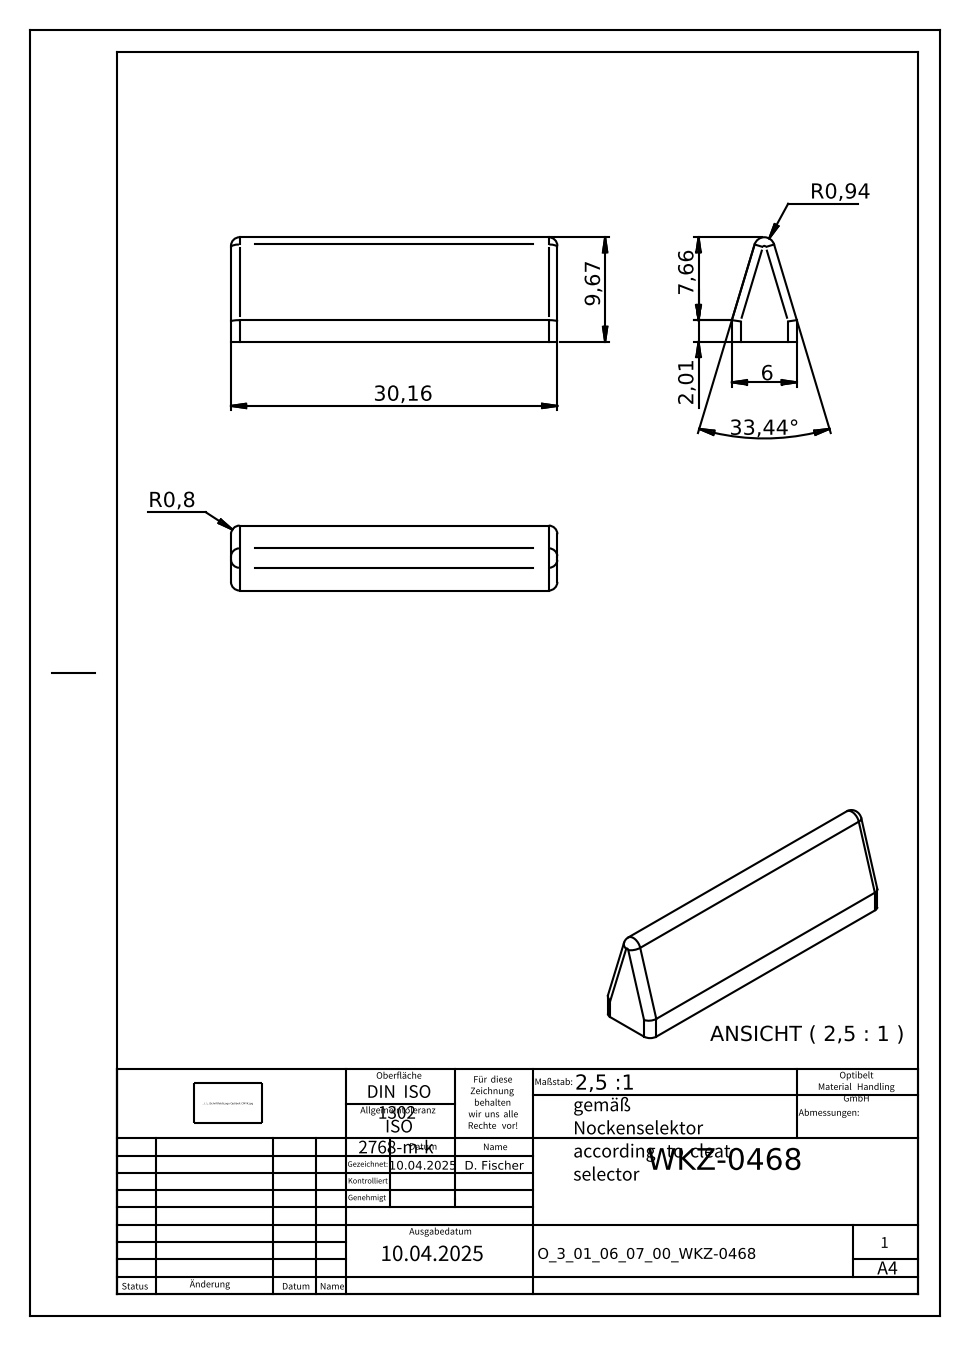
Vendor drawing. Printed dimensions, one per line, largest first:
33,44°
30,16
9,67
7,66
6
2,01
R0,94
R0,8
